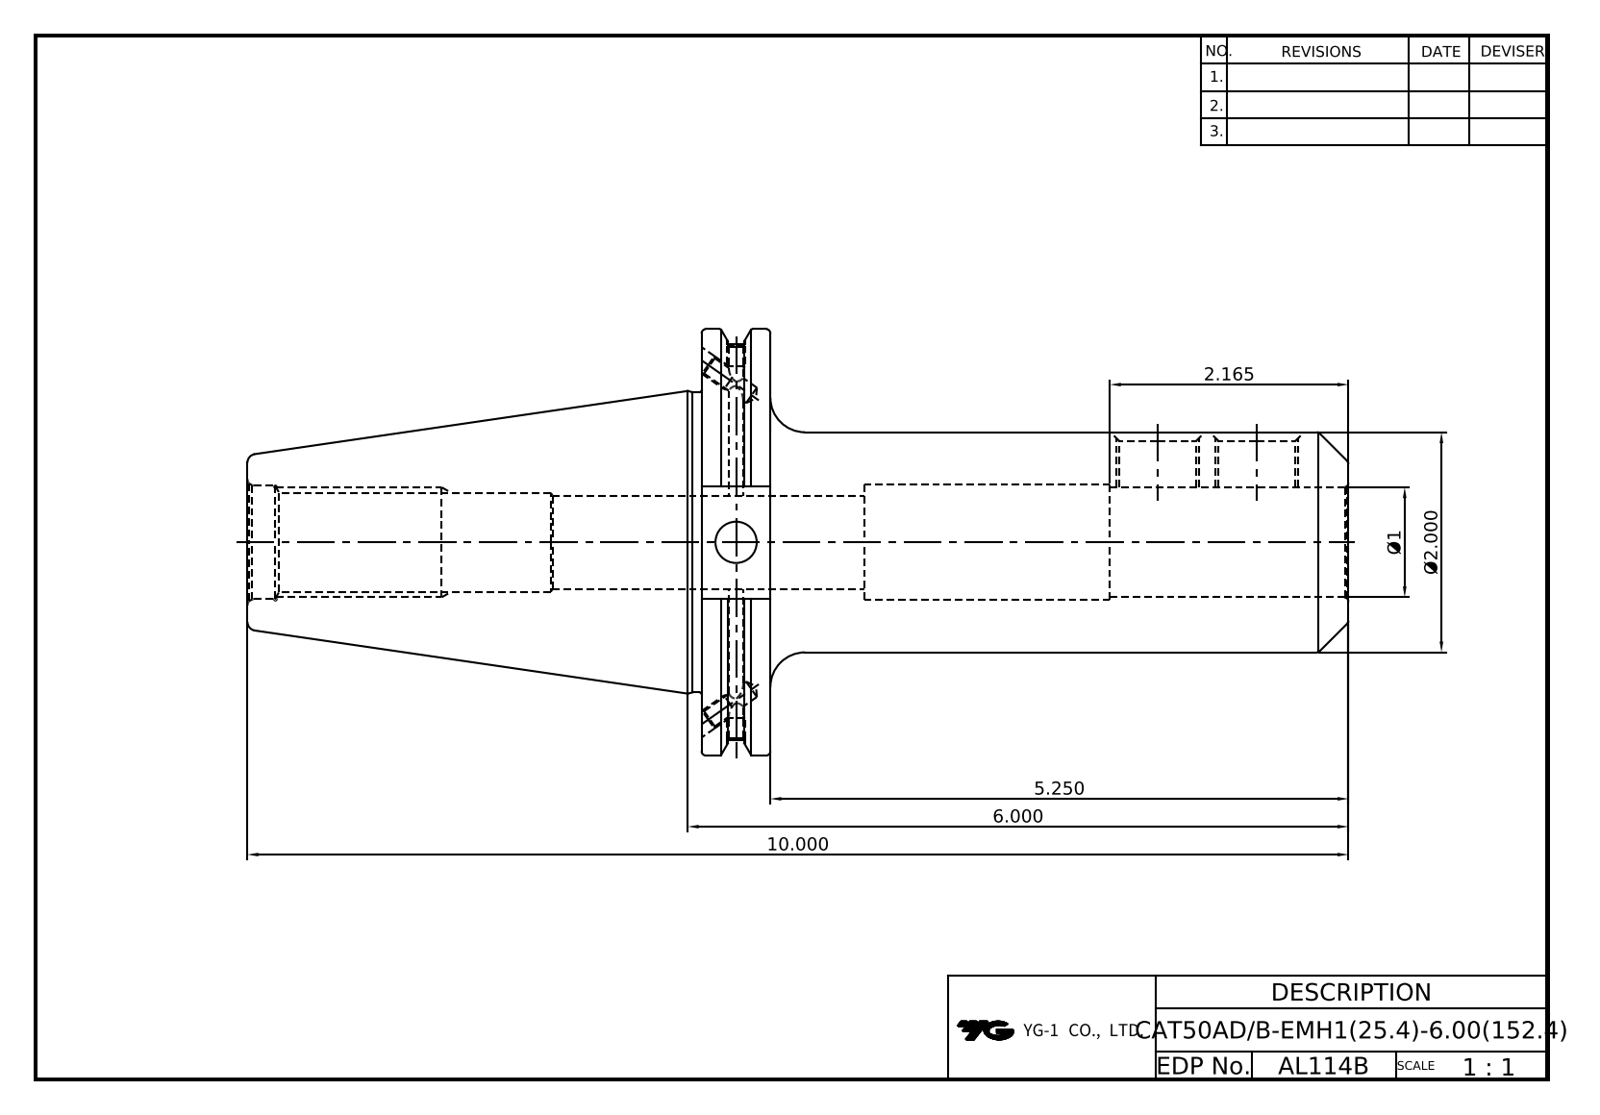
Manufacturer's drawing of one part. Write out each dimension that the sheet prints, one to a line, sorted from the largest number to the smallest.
10.000
6.000
5.250
2.165
Ø2.000
Ø1
